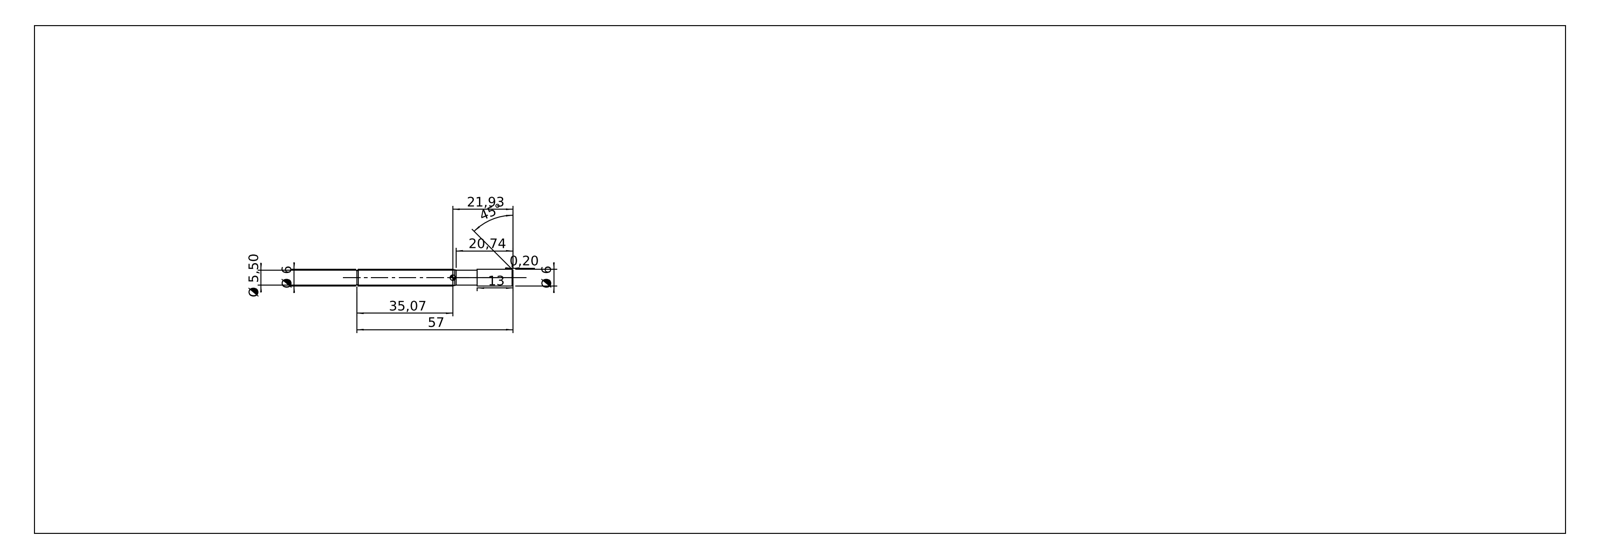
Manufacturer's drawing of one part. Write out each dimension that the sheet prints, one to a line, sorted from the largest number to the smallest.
57
45°
35,07
21,93
20,74
13
Ø 6
Ø 6
Ø 5,50
0,20
